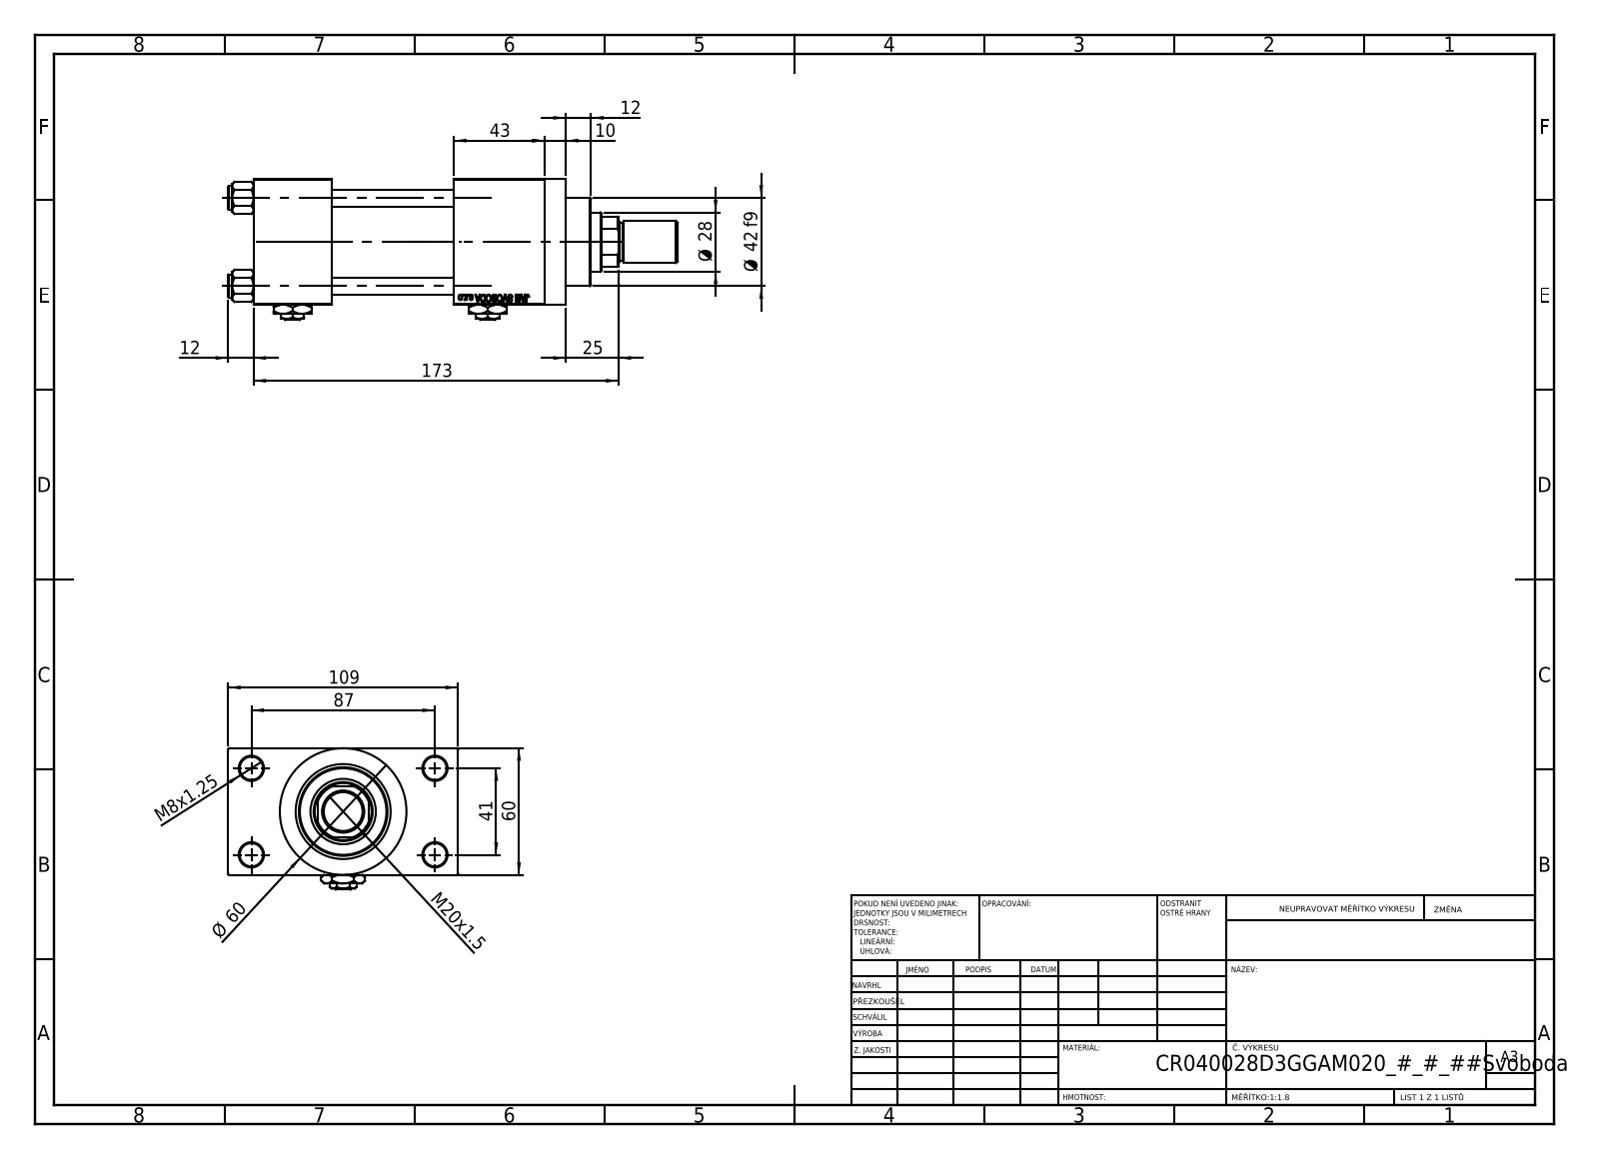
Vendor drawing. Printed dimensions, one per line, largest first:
173
109
87
Ø 60
60
43
Ø 42 f9
41
Ø 28
25
M20x1.5
12
12
10
M8x1.25
